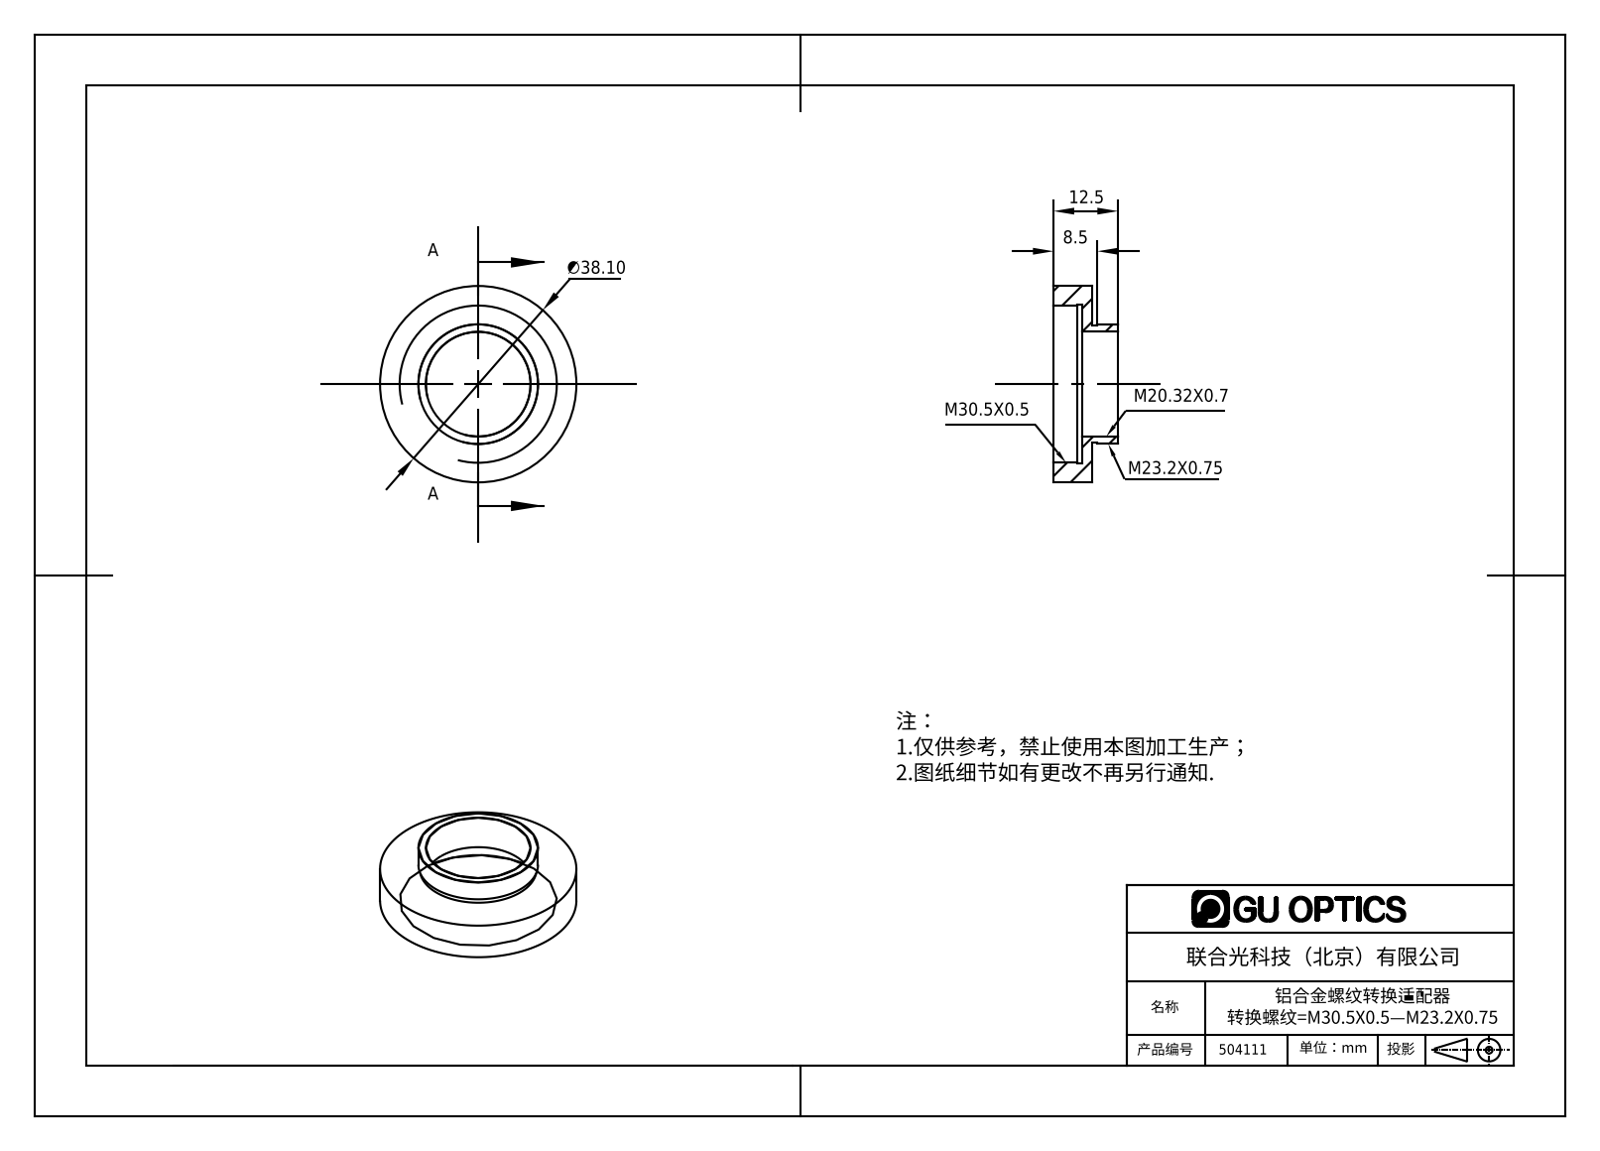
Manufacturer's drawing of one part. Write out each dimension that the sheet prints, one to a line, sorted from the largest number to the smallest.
∅38.10
12.5
8.5
